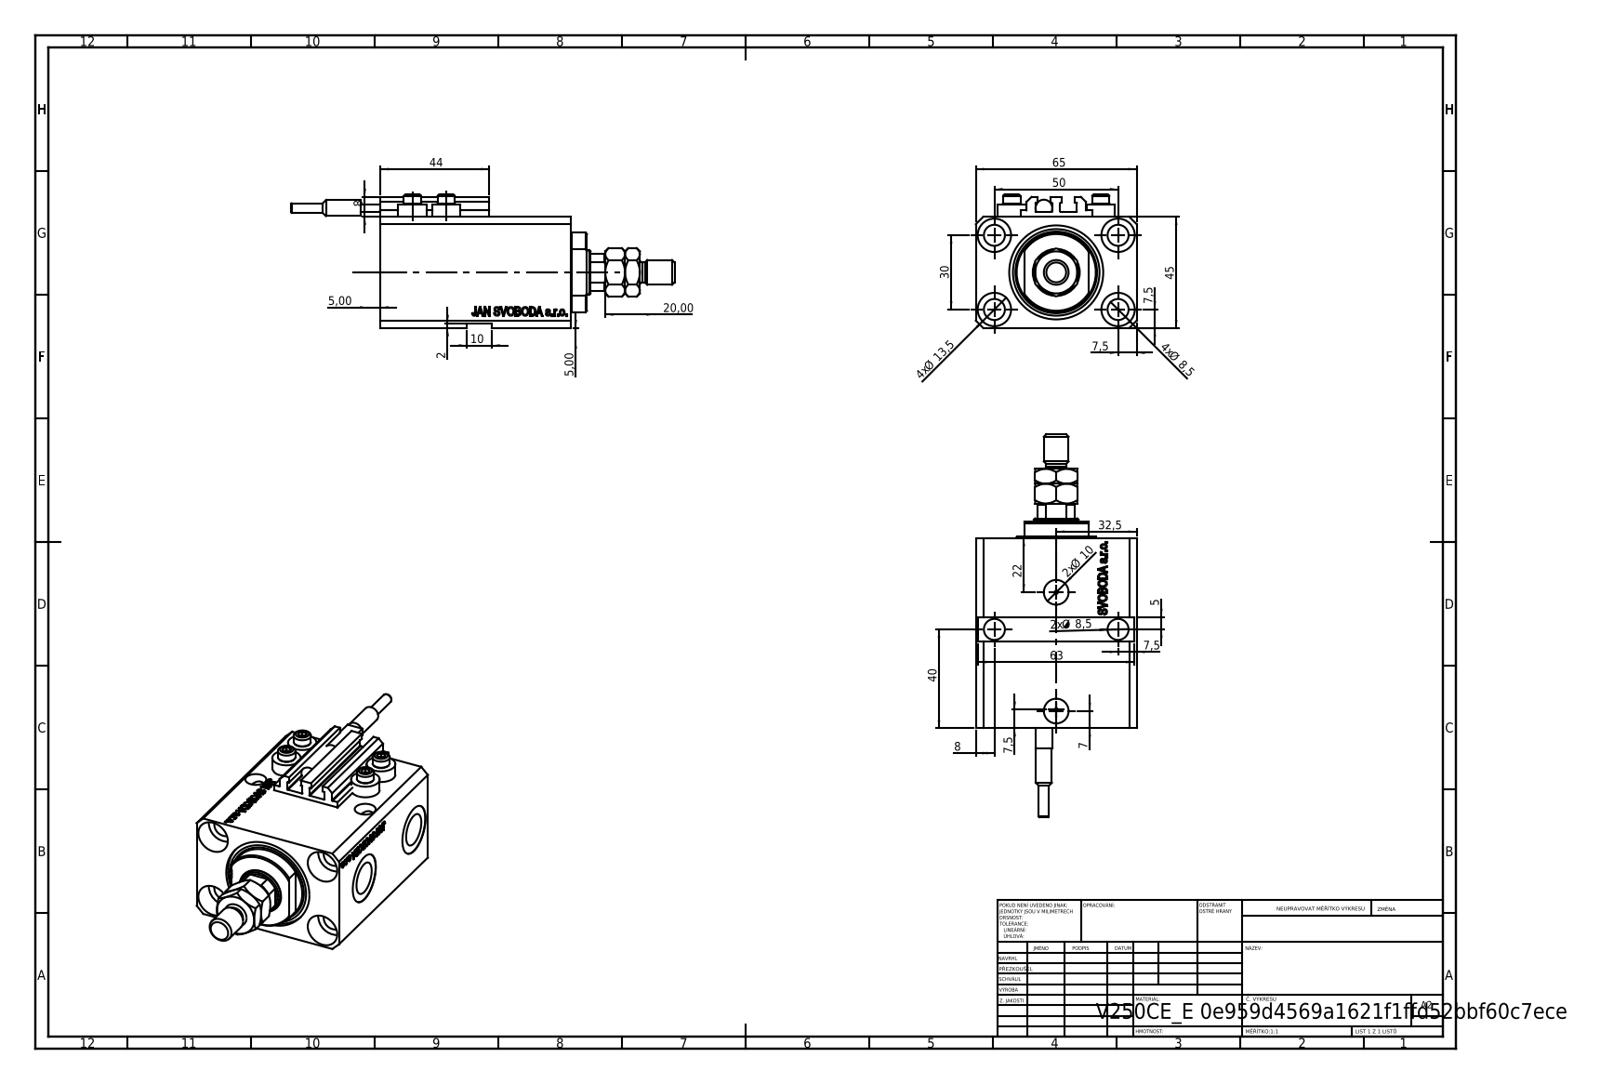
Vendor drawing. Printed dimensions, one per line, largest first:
65
63
50
45
44
40
32,5
30
22
20,00
4x Ø 13,5
10
2x Ø 10
4x Ø 8,5
2x Ø 8,5
8
8
7,5
7,5
7,5
7,5
7
5,00
5,00
5
2
